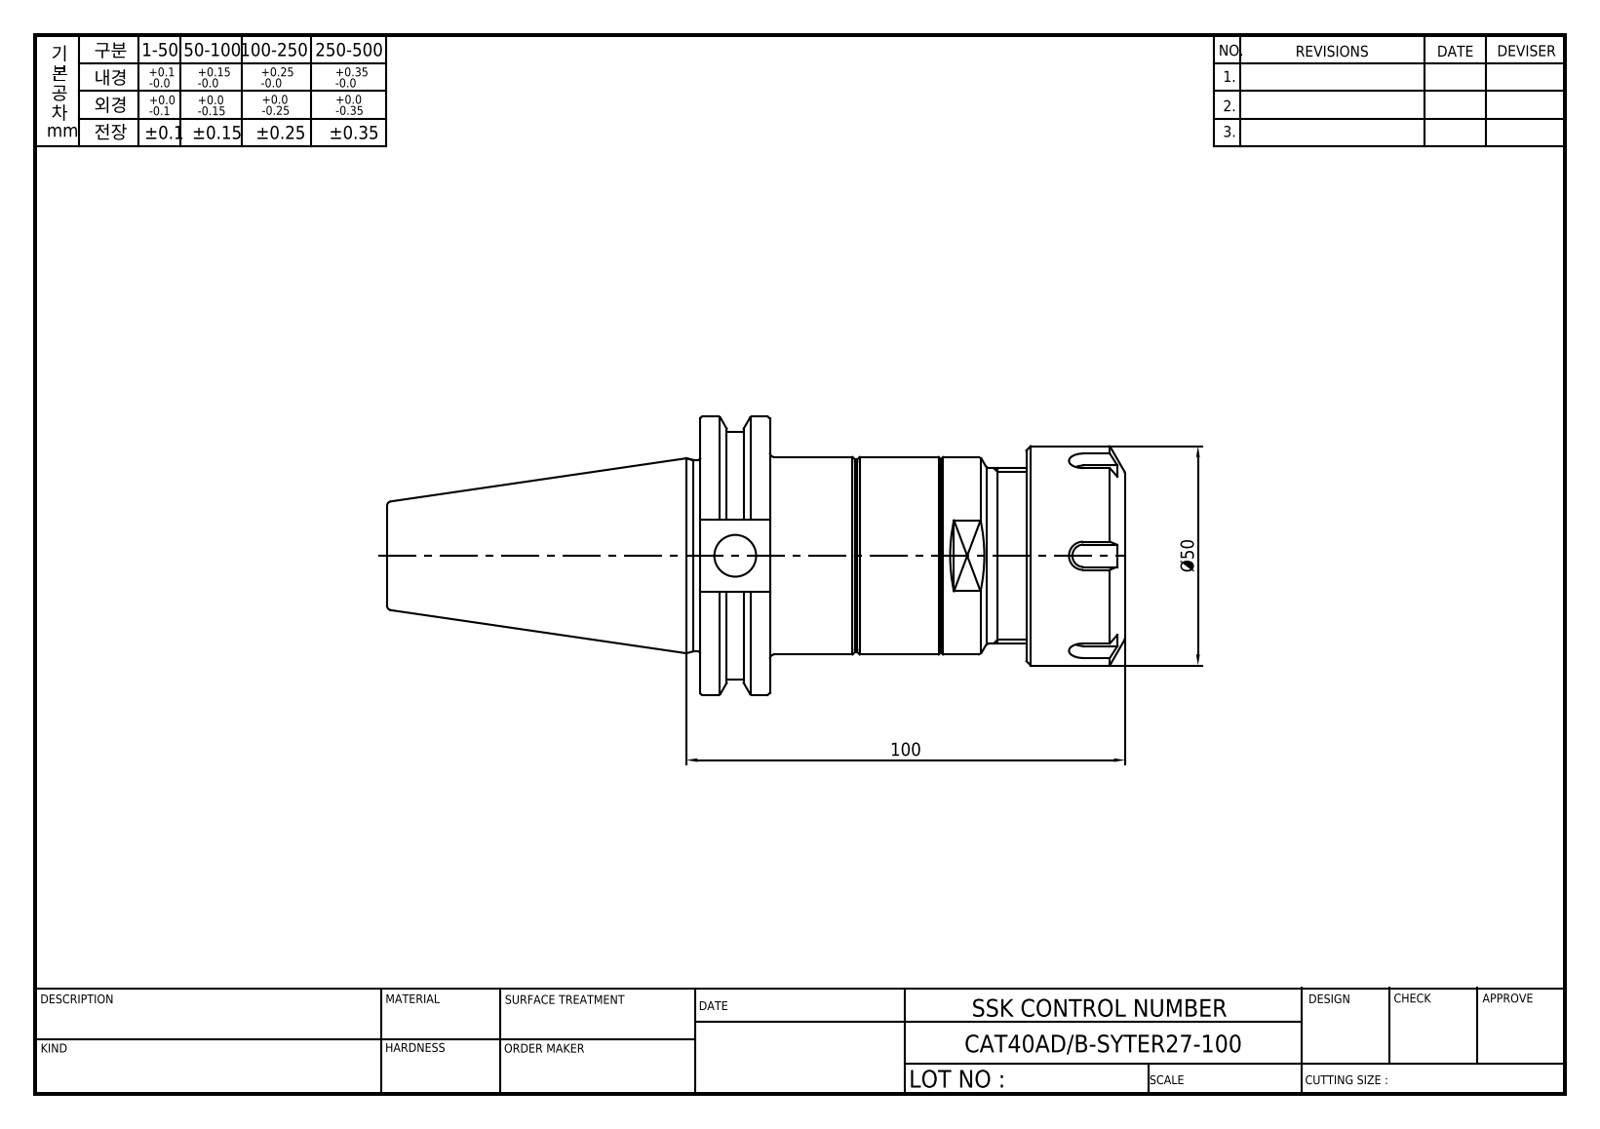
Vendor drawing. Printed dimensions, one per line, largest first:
100
Ø50
